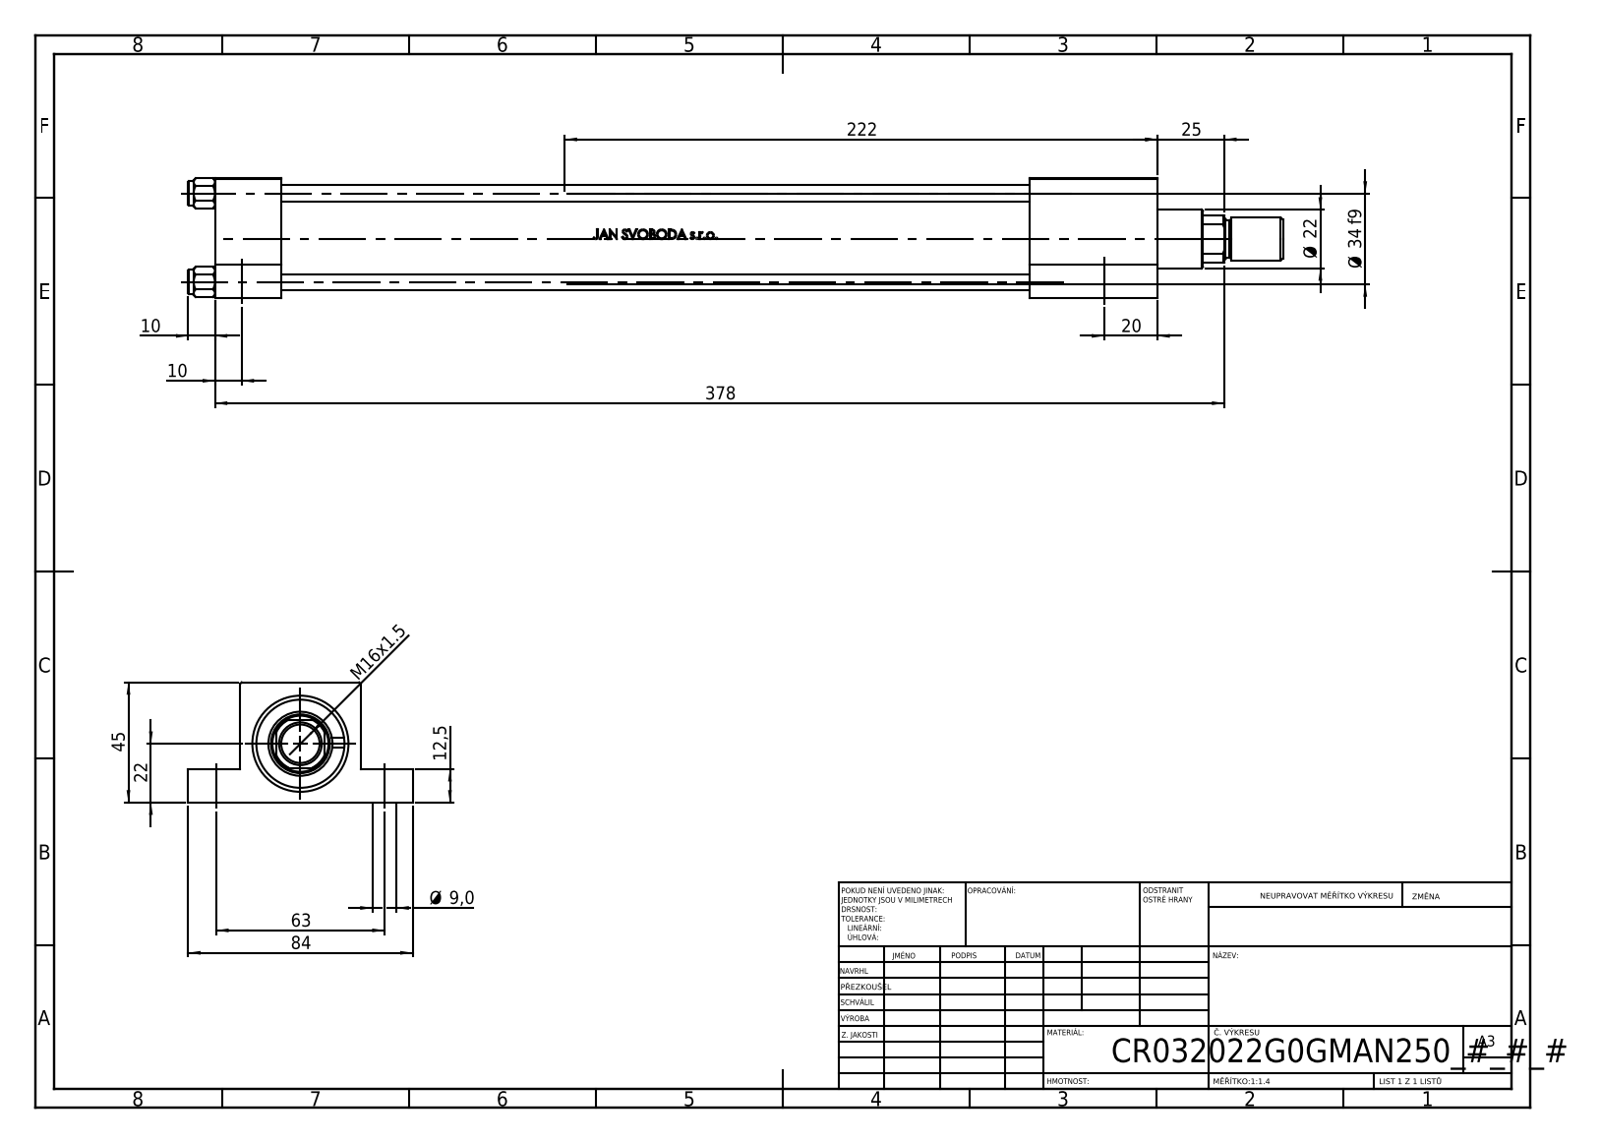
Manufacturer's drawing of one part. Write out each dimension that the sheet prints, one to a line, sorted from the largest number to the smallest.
378
222
84
63
45
Ø 34 f9
25
Ø 22
22
20
M16x1.5
12,5
10
10
Ø 9,0
